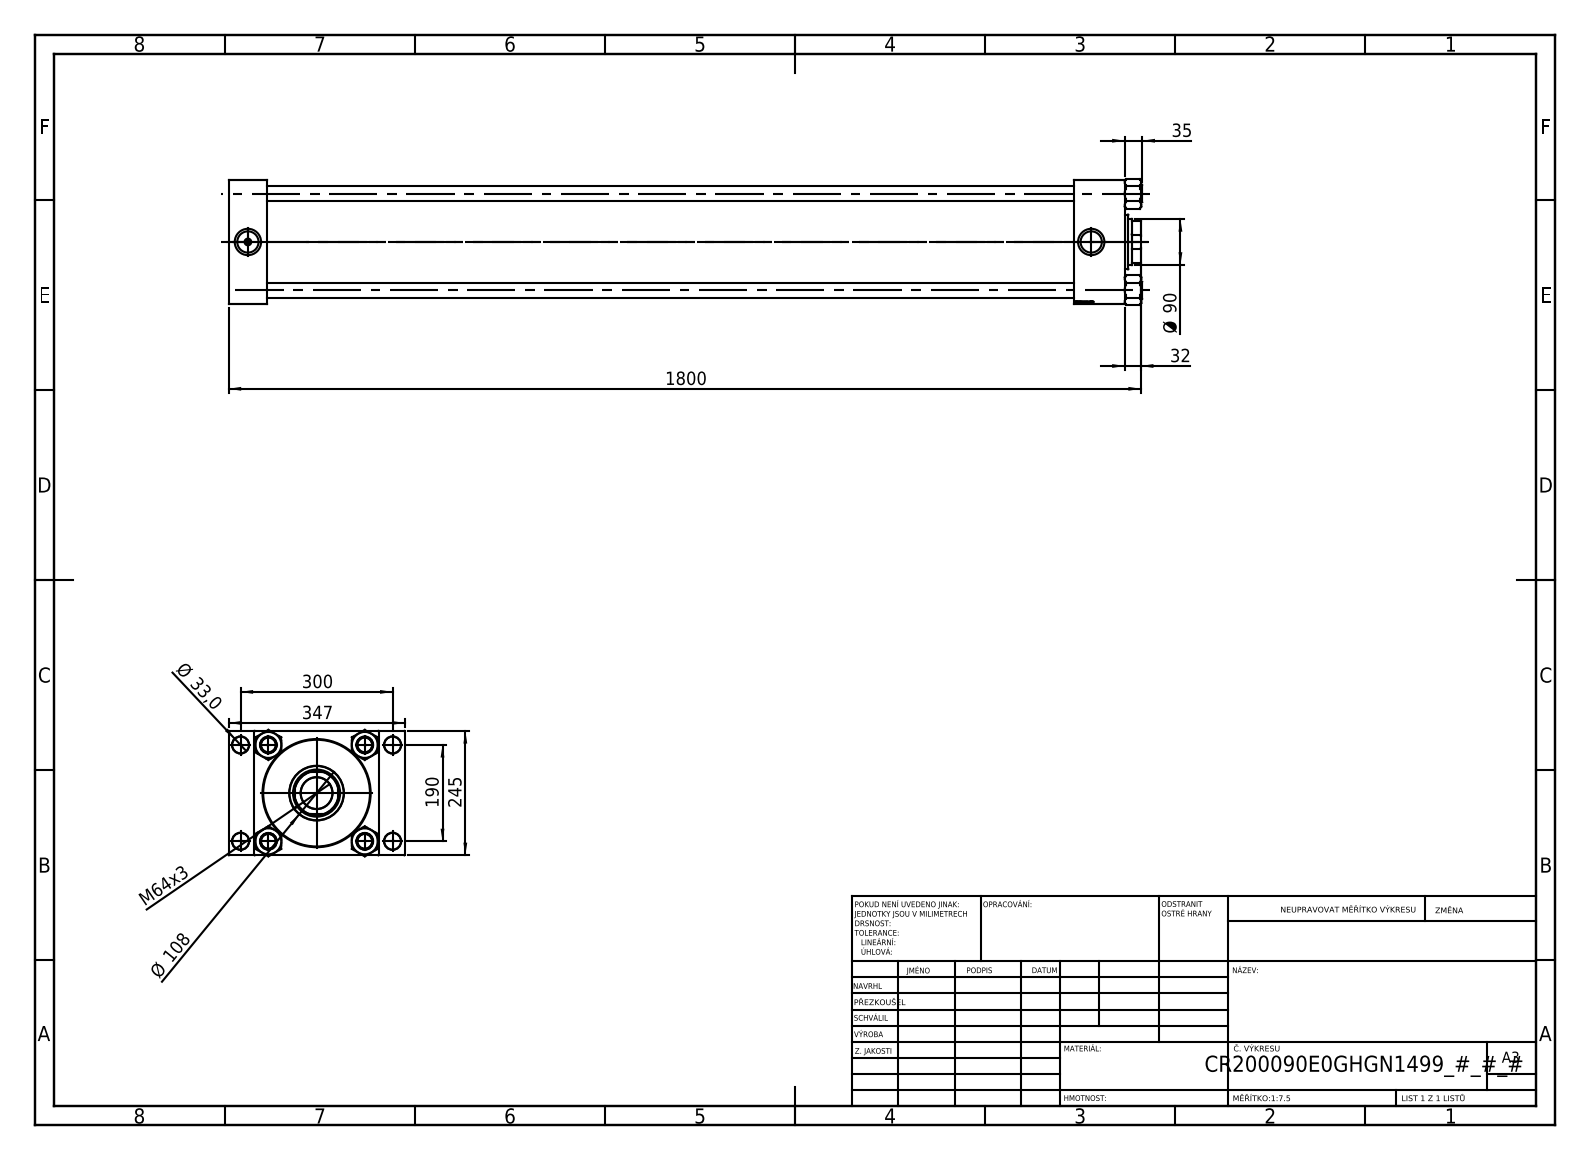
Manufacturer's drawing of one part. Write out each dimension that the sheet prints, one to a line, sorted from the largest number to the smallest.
1800
347
300
245
190
Ø 108
Ø 90
M64x3
35
Ø 33,0
32
